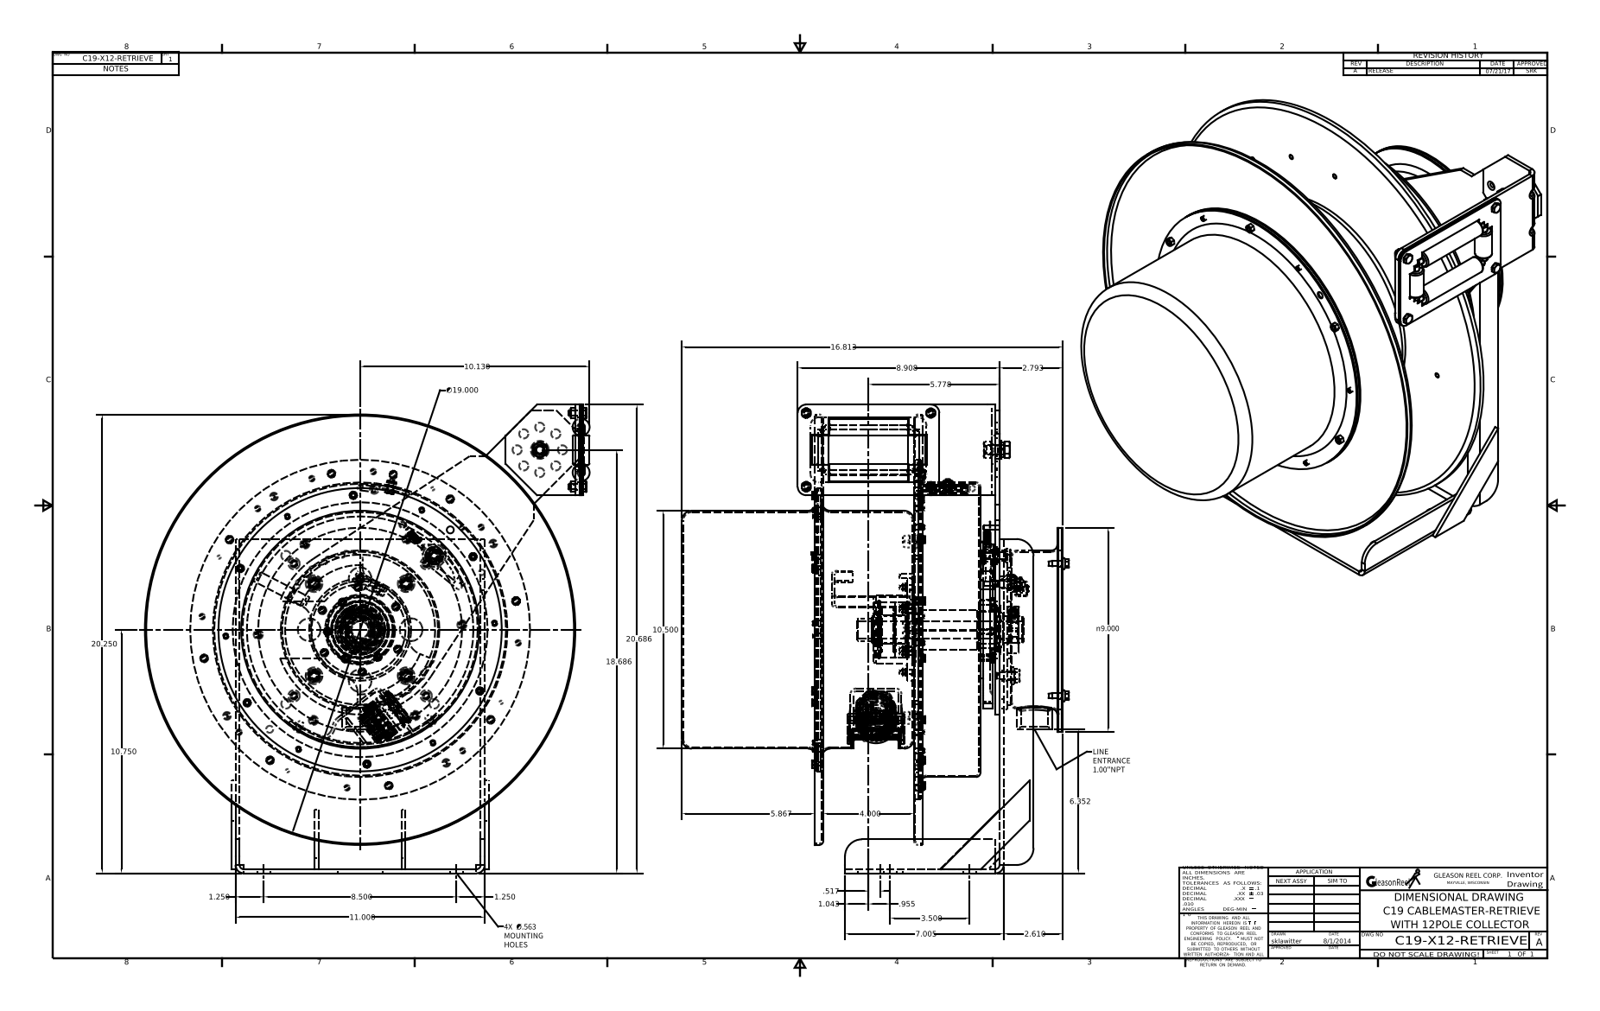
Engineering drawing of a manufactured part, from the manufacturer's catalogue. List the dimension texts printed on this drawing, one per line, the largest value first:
20.686
20.250
∅19.000
18.686
16.813
11.000
10.750
10.500
10.130
n9.000
8.908
8.500
7.005
6.352
5.867
5.778
4.000
3.500
2.793
2.610
1.250
1.250
1.043
.955
.517
